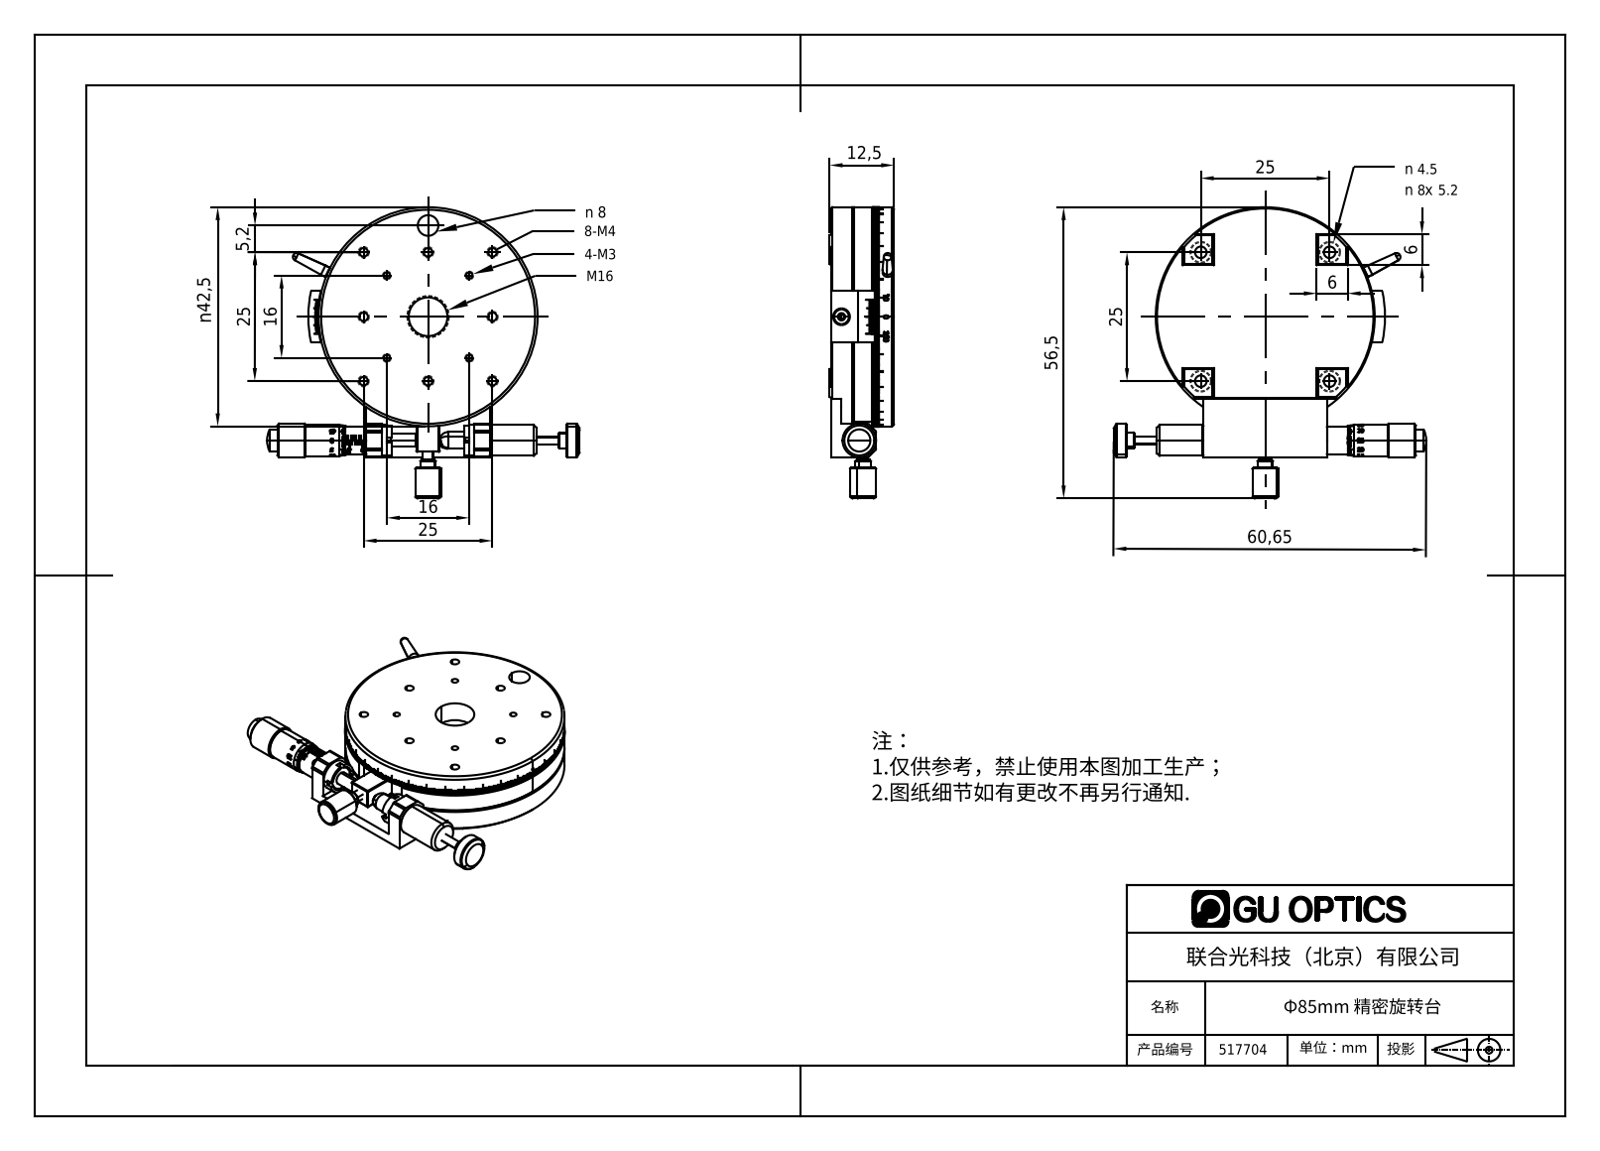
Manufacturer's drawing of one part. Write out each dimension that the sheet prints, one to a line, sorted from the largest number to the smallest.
60,65
56,5
n42,5
25
25
25
25
16
16
12,5
6
6
5,2
